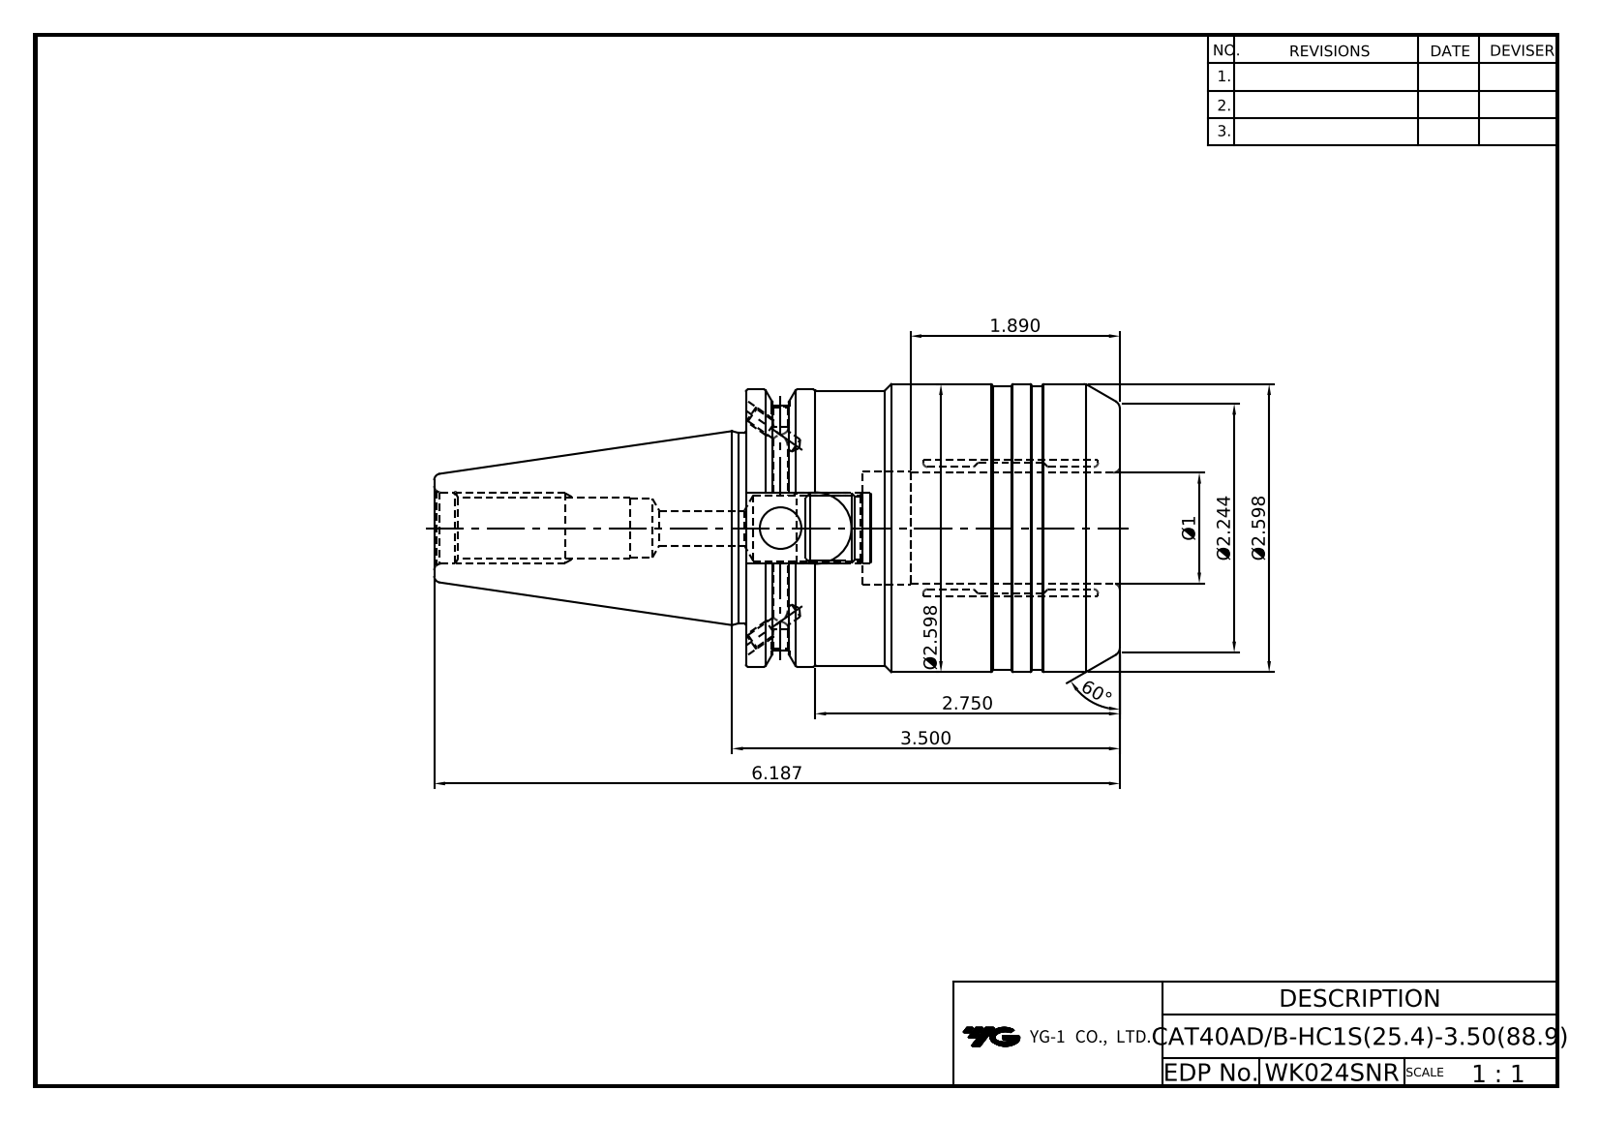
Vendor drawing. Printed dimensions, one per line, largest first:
60°
6.187
3.500
2.750
Ø2.598
Ø2.598
Ø2.244
1.890
Ø1
